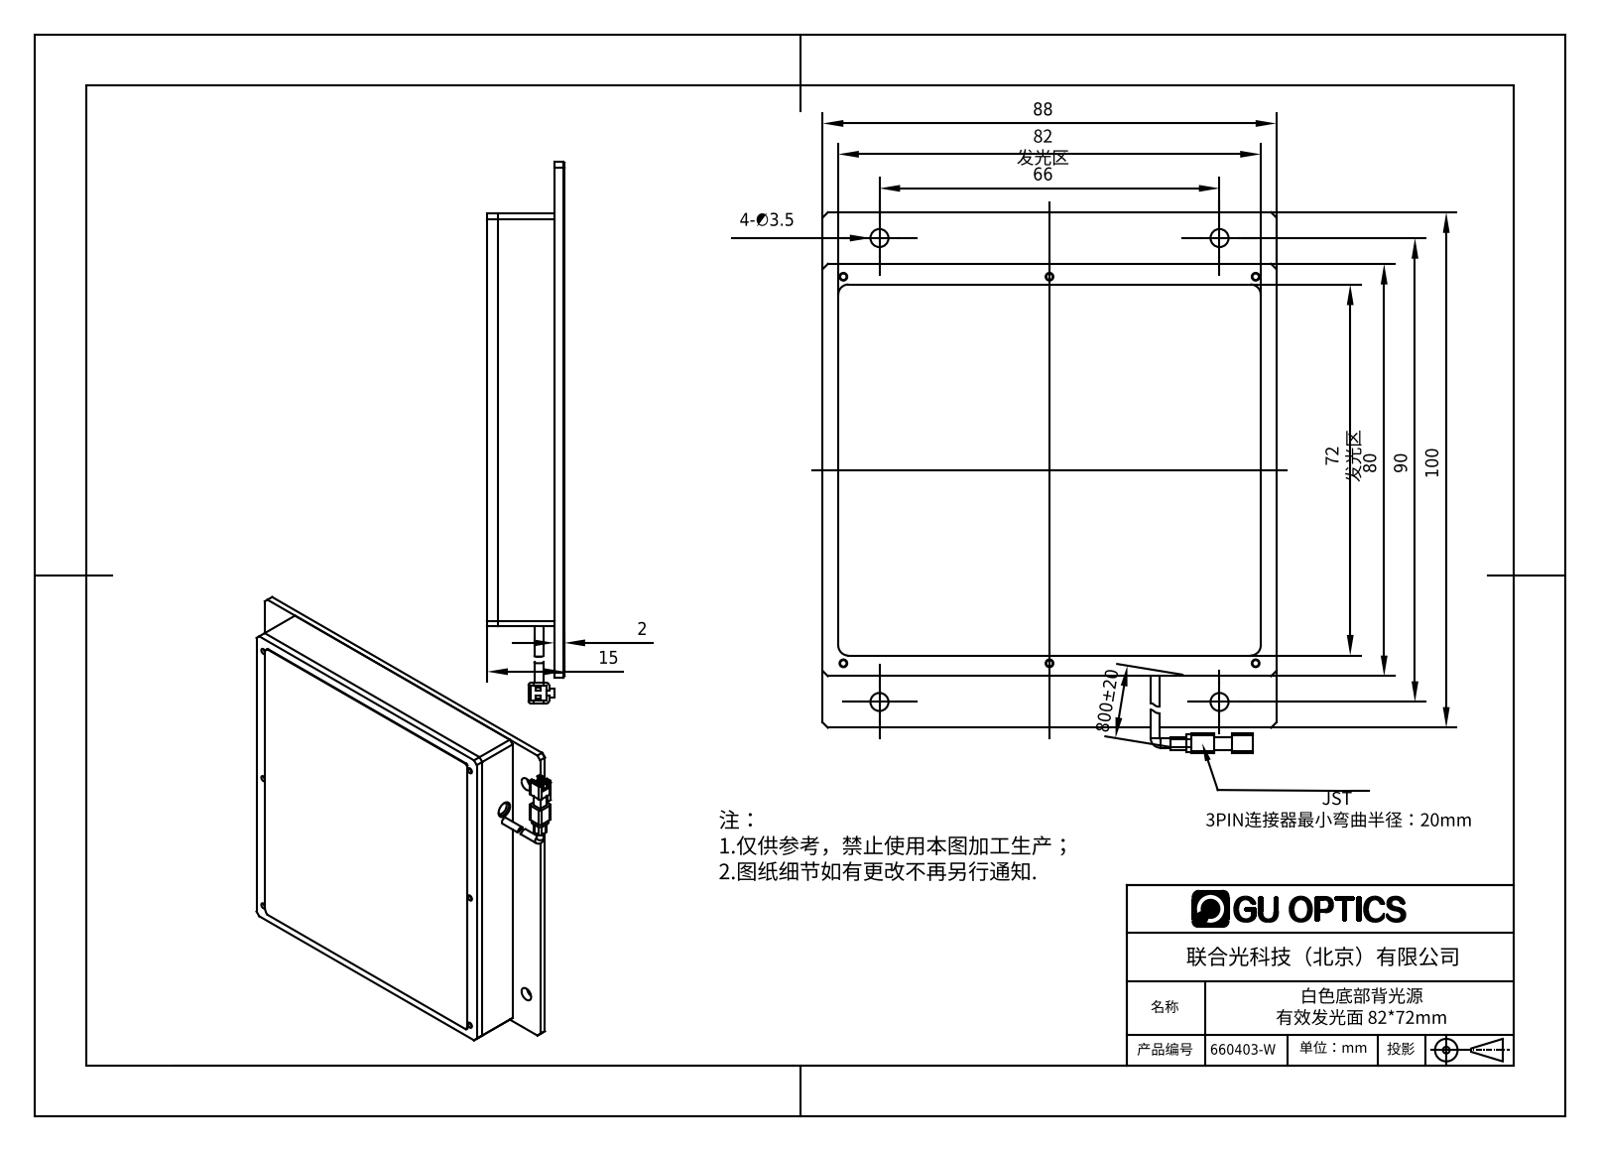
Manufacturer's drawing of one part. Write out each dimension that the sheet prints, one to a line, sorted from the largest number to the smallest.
800±20
100
90
88
82 发光区
80
72 发光区
66
15
4-∅3.5
2
